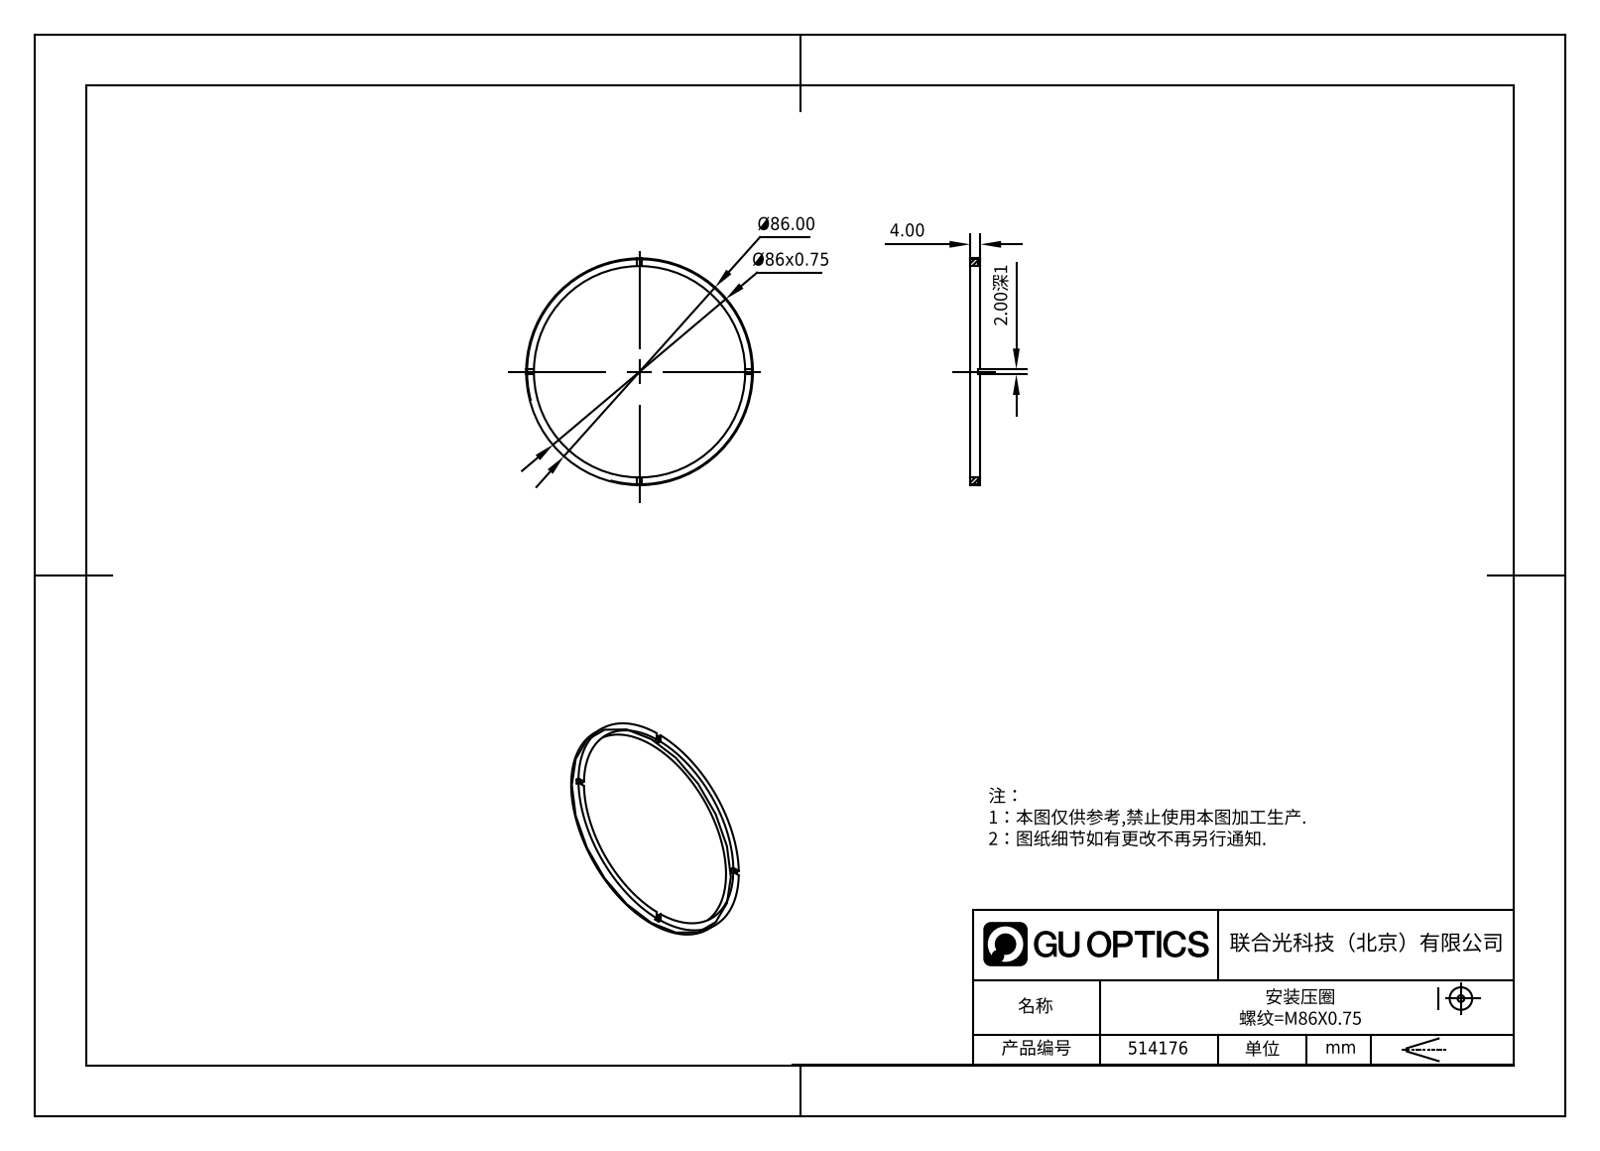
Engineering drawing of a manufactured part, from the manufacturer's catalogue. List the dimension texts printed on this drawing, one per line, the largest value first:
Ø86.00
Ø86x0.75
4.00
2.00深1
